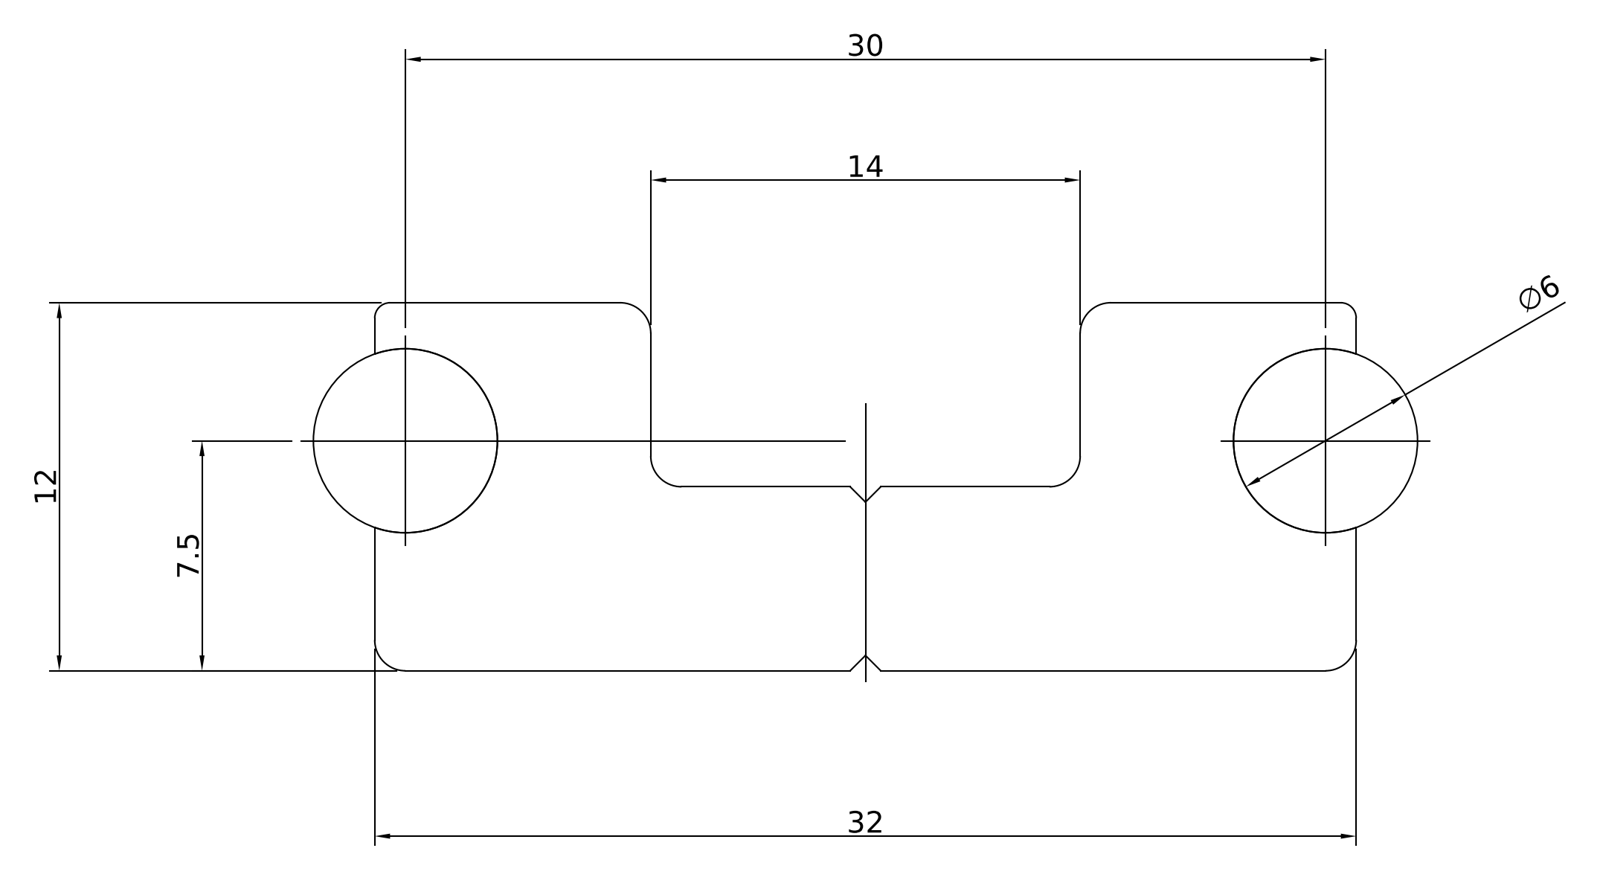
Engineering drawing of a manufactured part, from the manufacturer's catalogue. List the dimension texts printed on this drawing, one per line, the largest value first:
32
30
14
12
7.5
∅6
